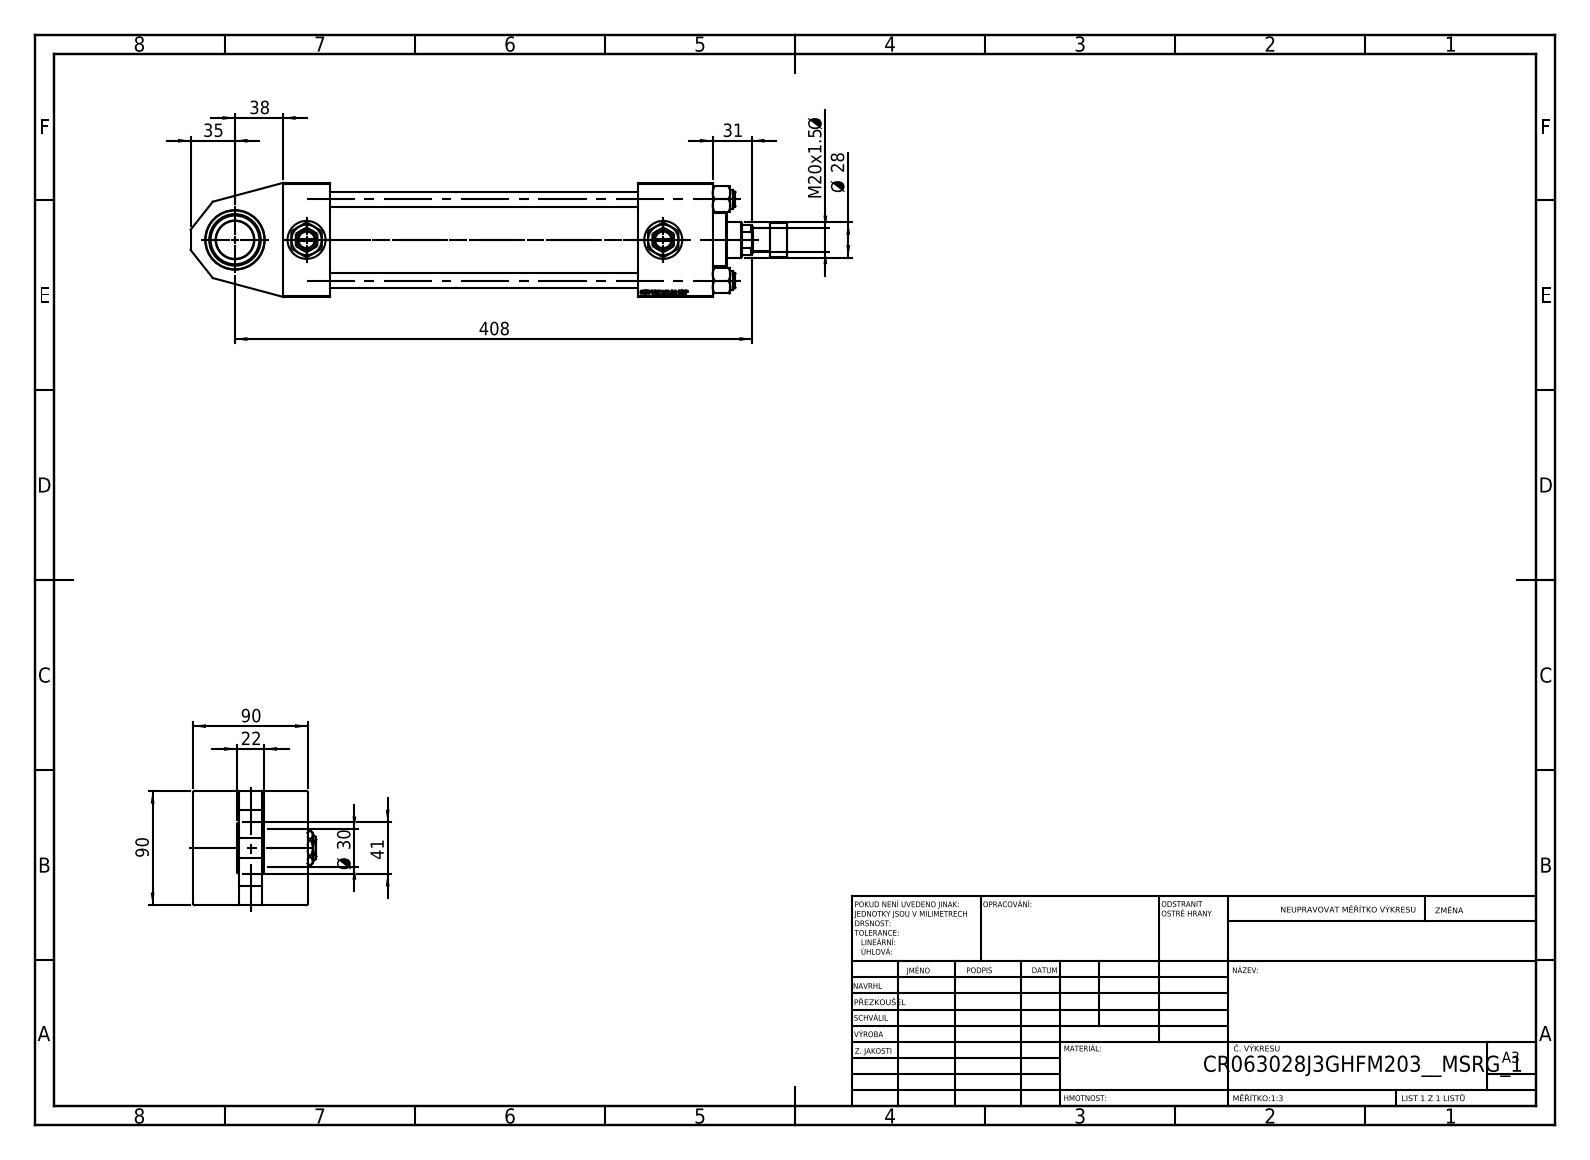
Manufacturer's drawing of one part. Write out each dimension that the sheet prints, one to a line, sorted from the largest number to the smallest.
408
90
90
41
38
35
31
Ø 30
Ø 28
22
M20x1.5 Ø
